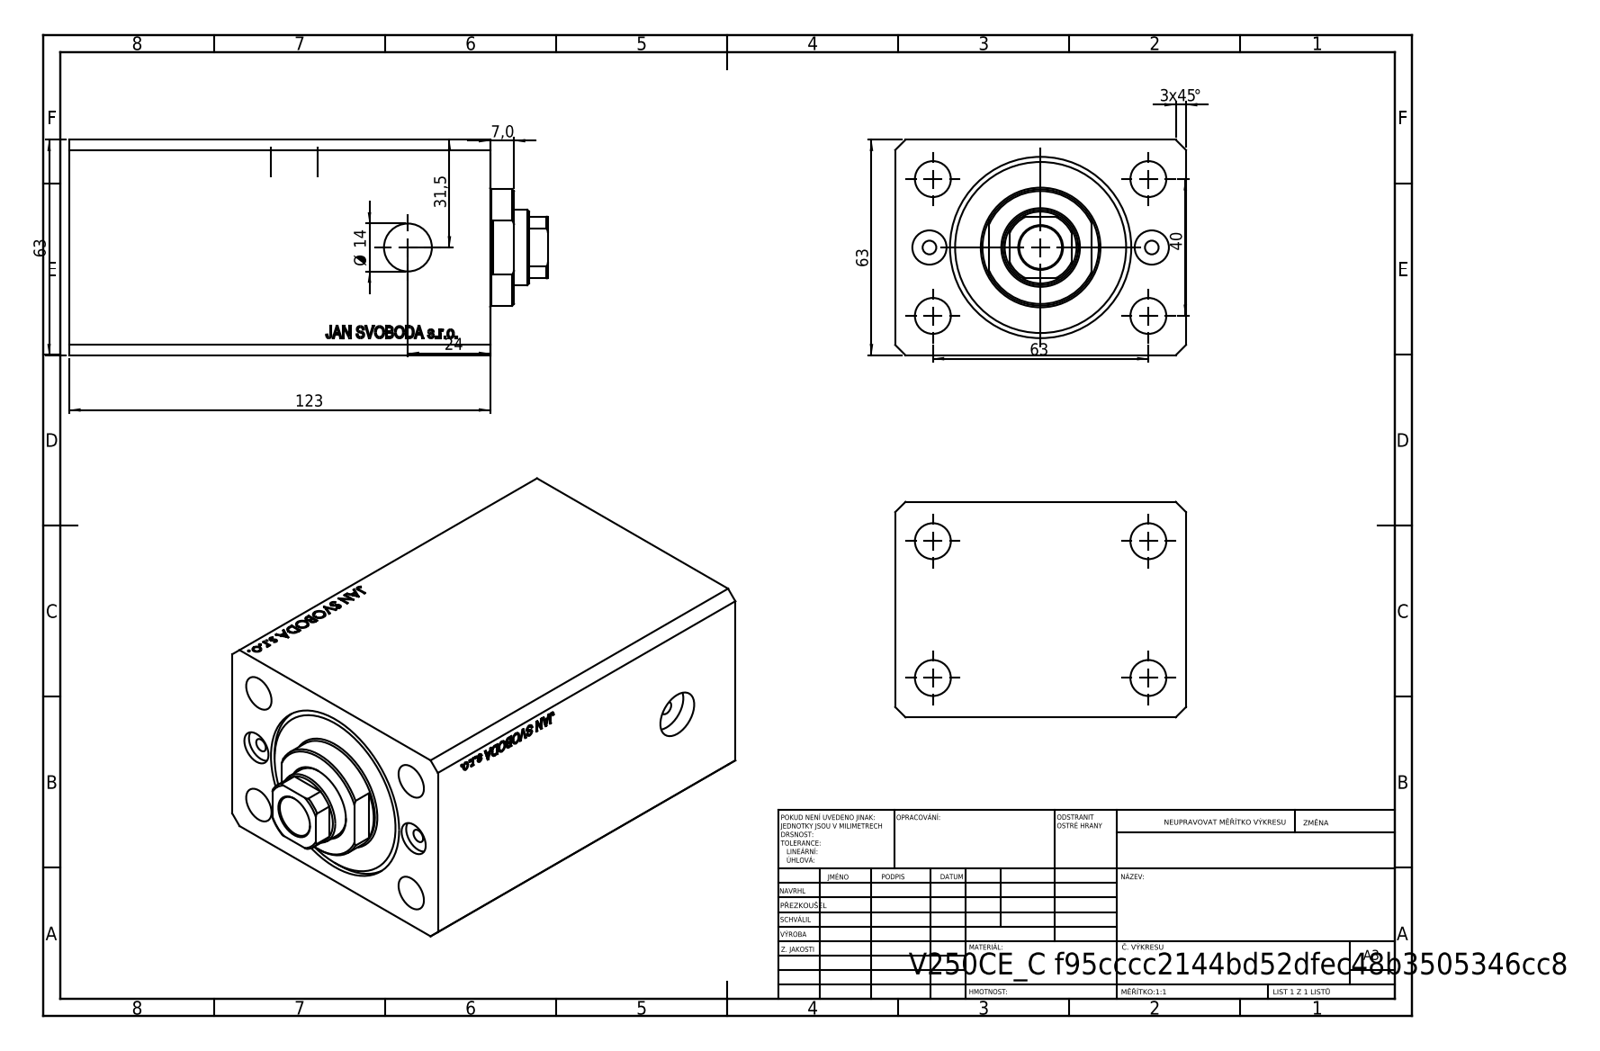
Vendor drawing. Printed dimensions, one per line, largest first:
123
63
63
63
3 x45 °
40
31,5
24
Ø 14
7,0
